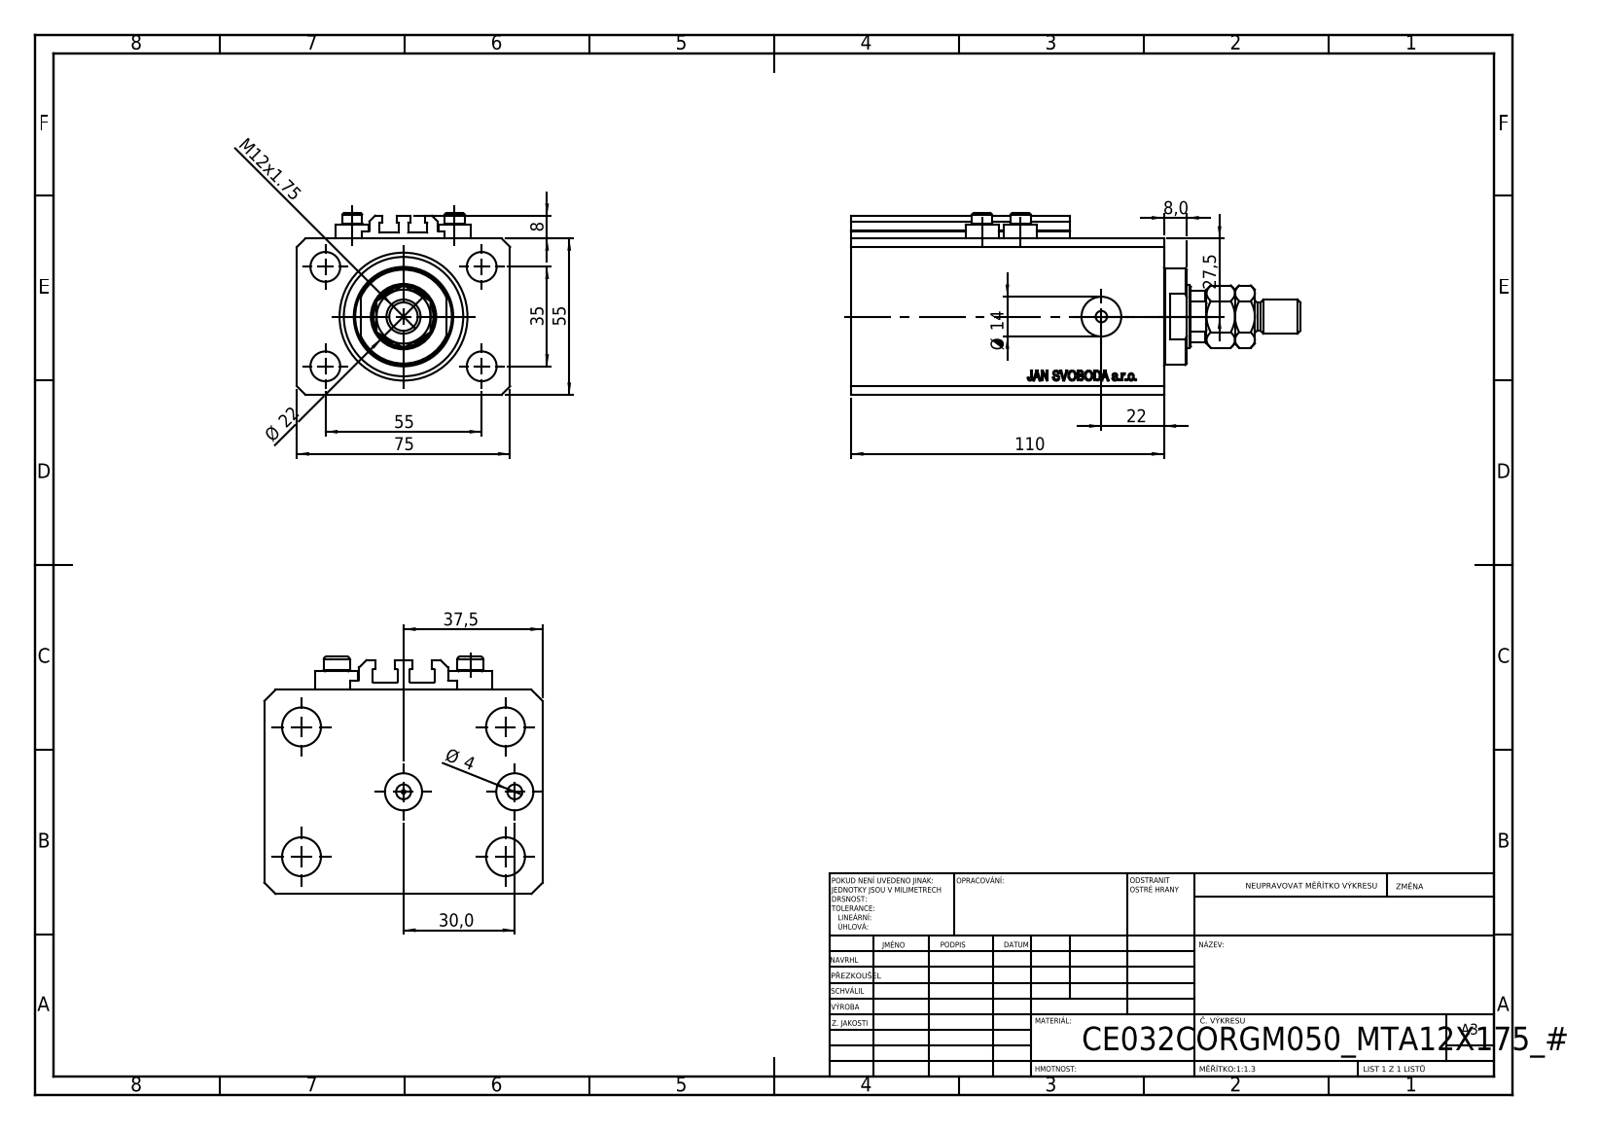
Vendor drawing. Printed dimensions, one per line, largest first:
110
75
55
55
37,5
35
30,0
27,5
Ø 22
22
Ø 14
M12x1.75
8
8,0
Ø 4
